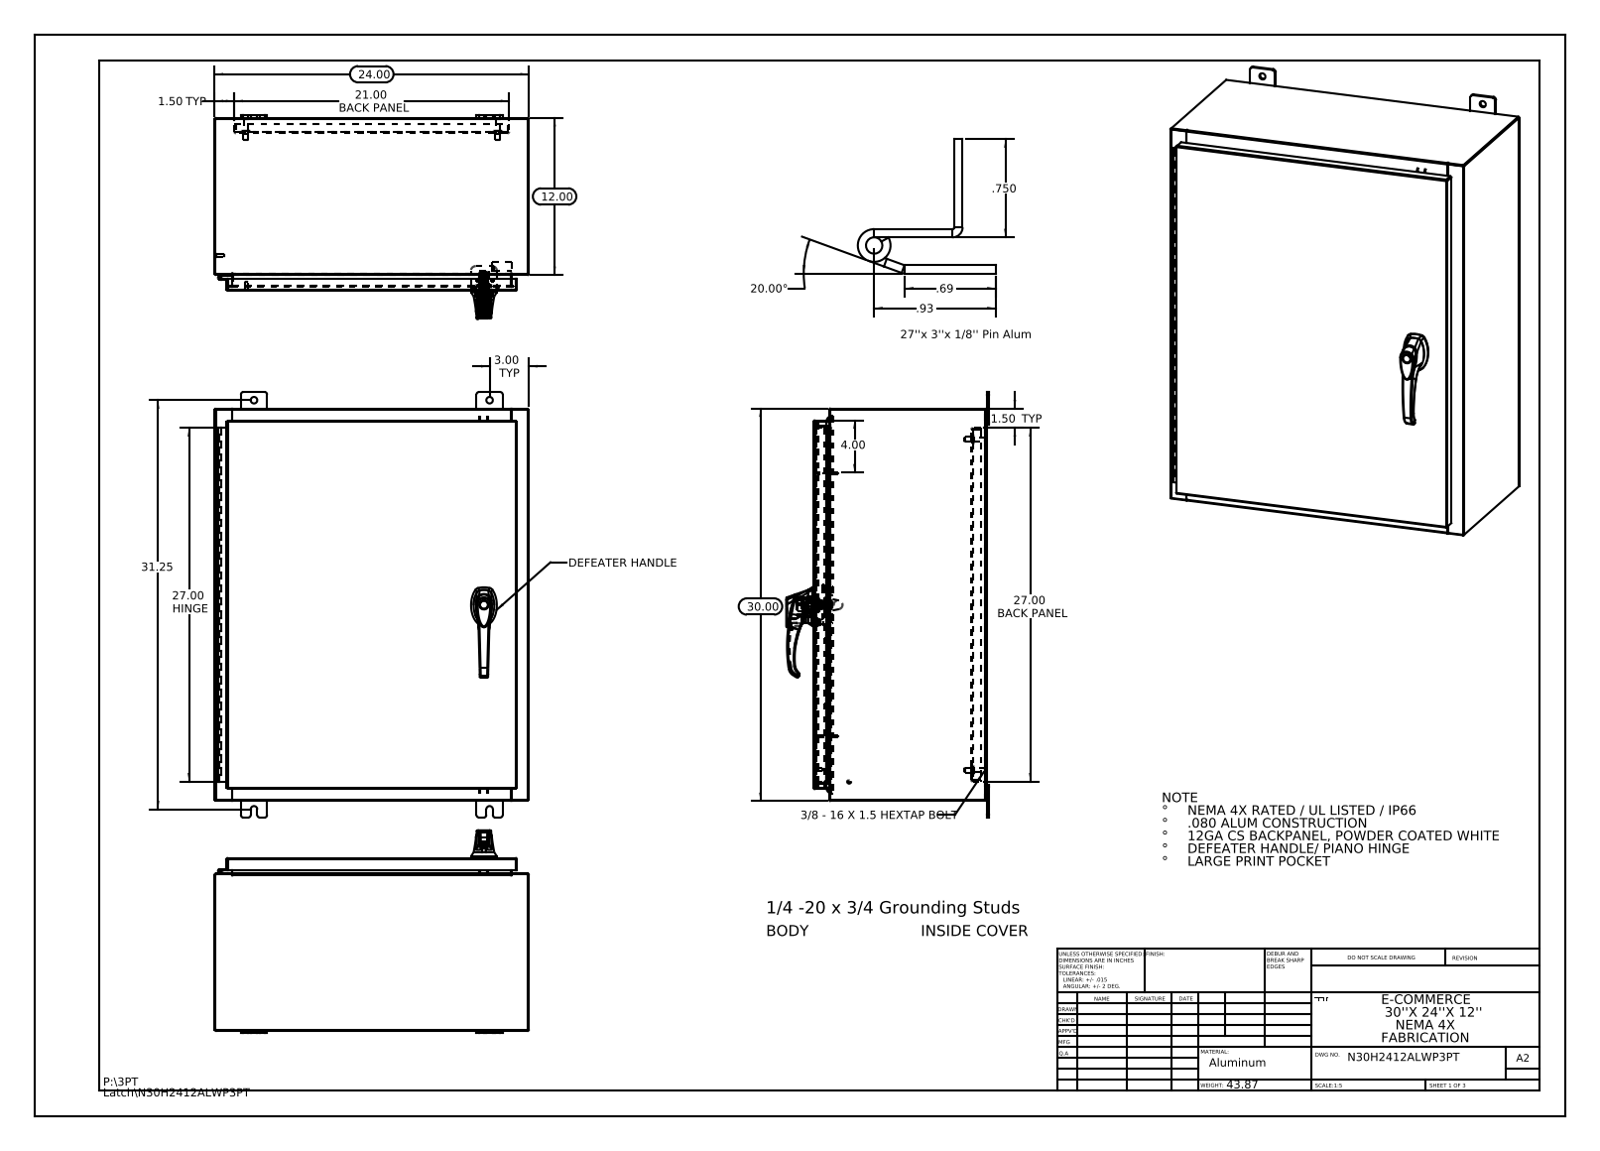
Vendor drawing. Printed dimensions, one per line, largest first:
31.25
30.00
27.00 HINGE
27.00 BACK PANEL
24.00
21.00 BACK PANEL
20.00°
12.00
4.00
3.00 TYP
1.50 TYP
1.50 TYP
.93
.750
.69
